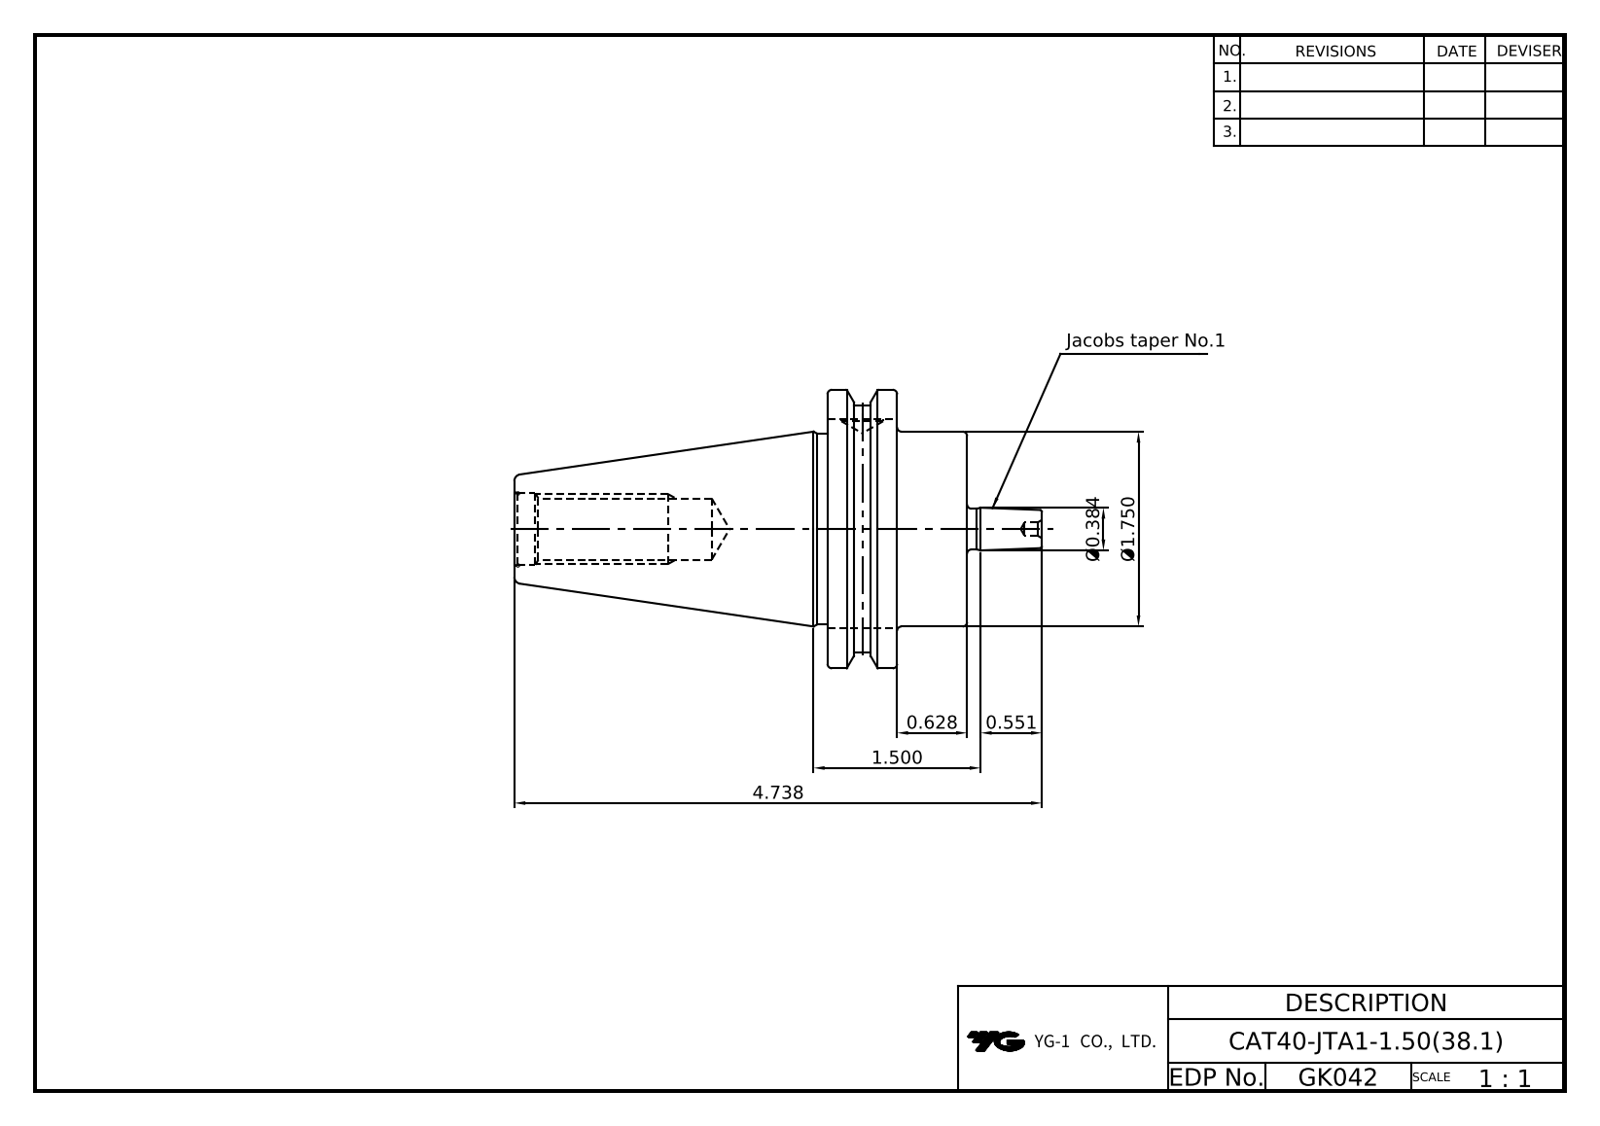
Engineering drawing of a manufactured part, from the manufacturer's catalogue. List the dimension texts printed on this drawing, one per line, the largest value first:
4.738
Ø1.750
1.500
0.628
0.551
Ø0.384
